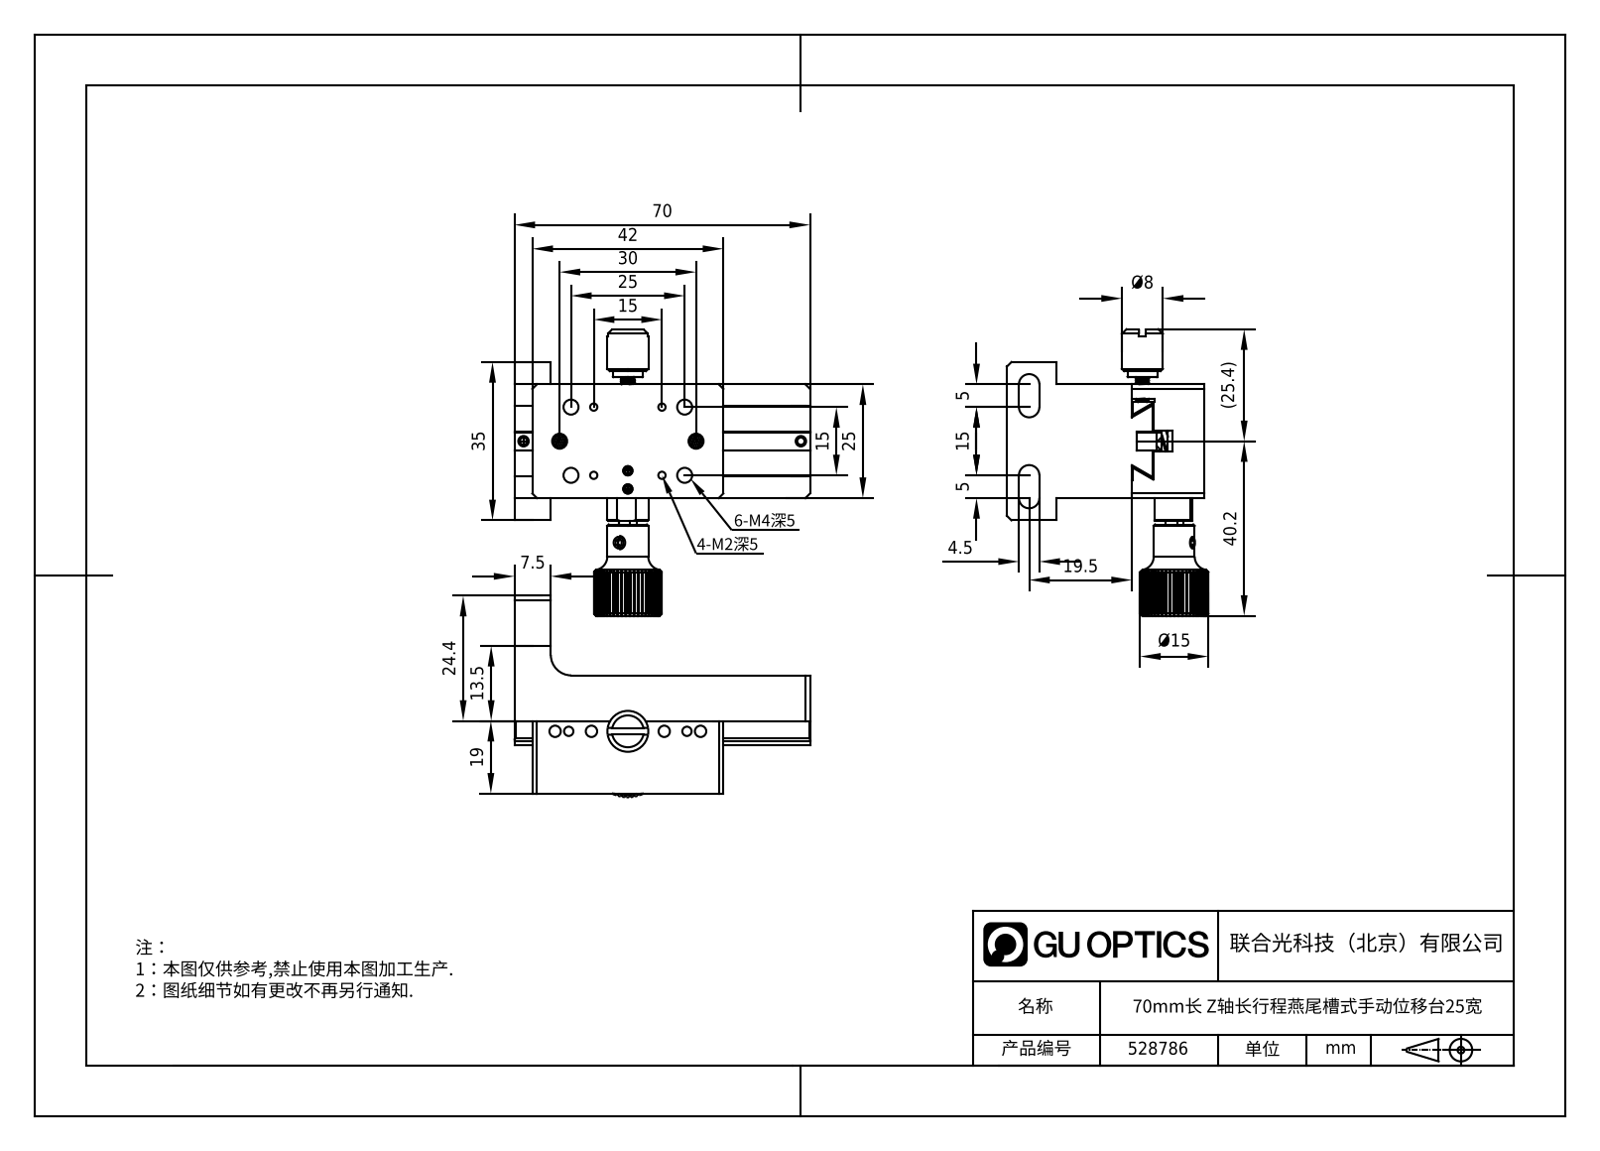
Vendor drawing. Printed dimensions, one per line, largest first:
70
42
40.2
35
30
(25.4)
25
25
24.4
19.5
19
Ø15
15
15
15
13.5
Ø8
7.5
5
5
4.5
